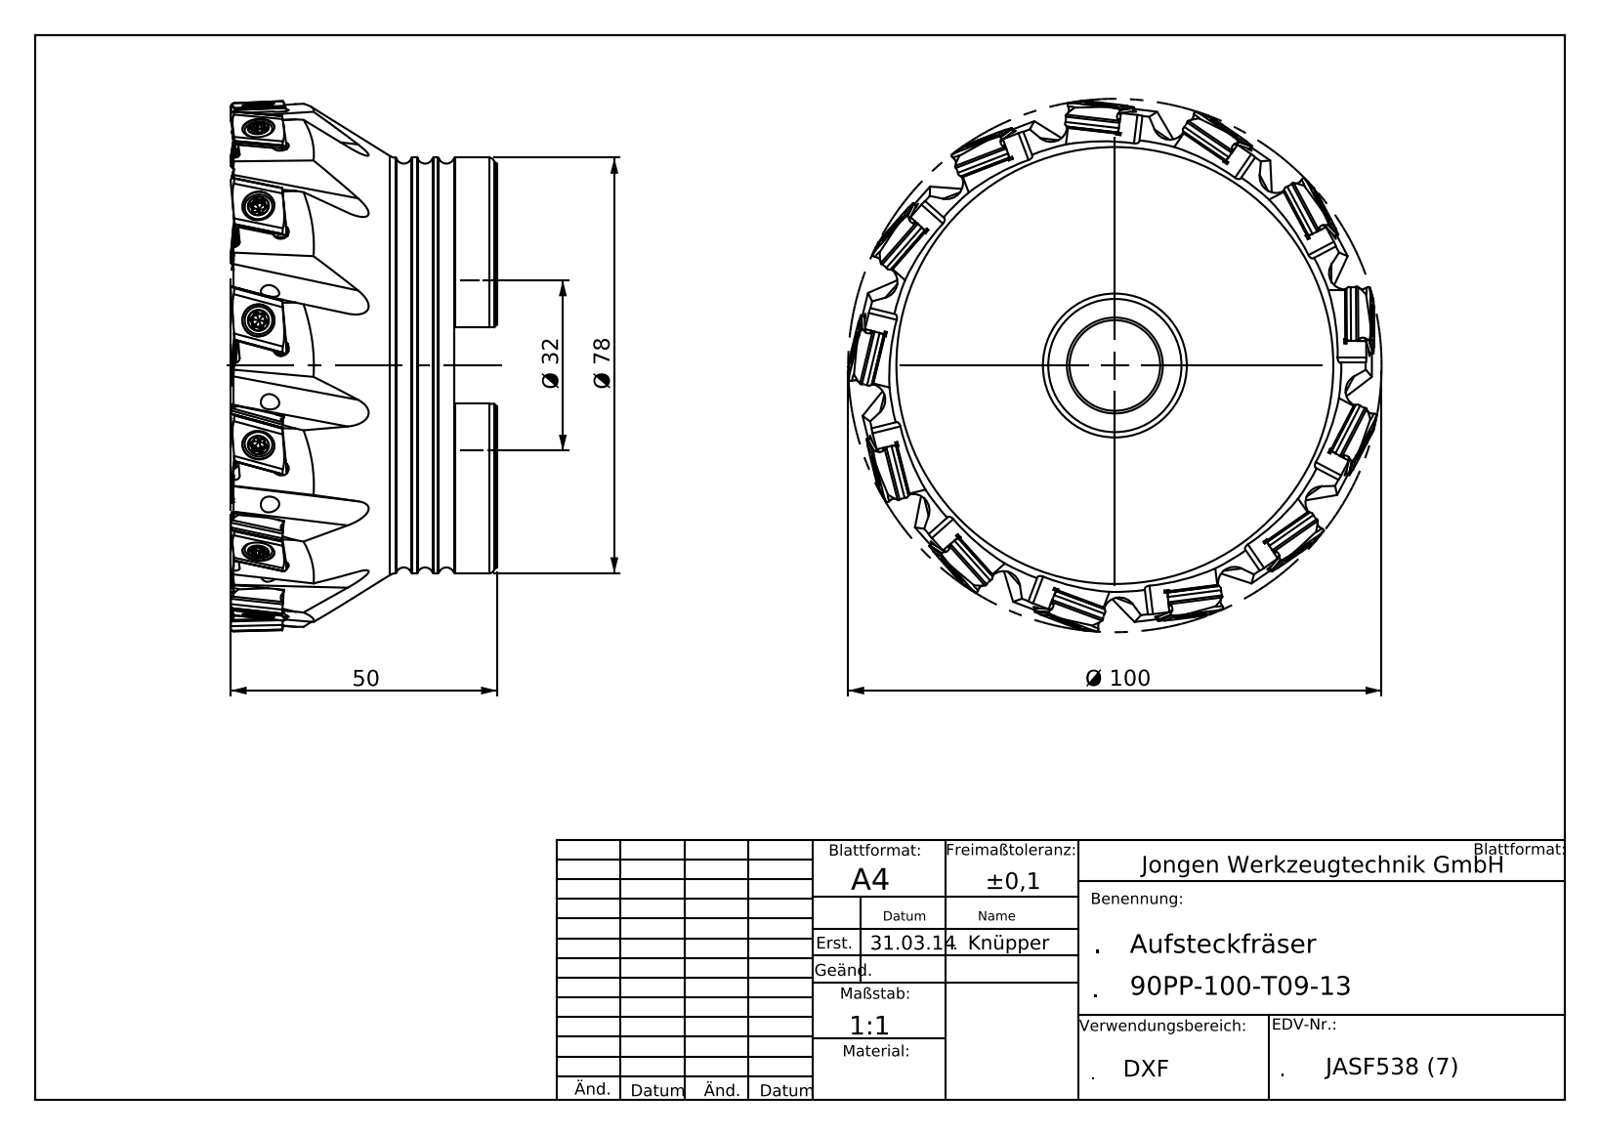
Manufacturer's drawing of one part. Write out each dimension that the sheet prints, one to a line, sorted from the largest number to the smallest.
Ø 100
Ø 78
50
Ø 32
